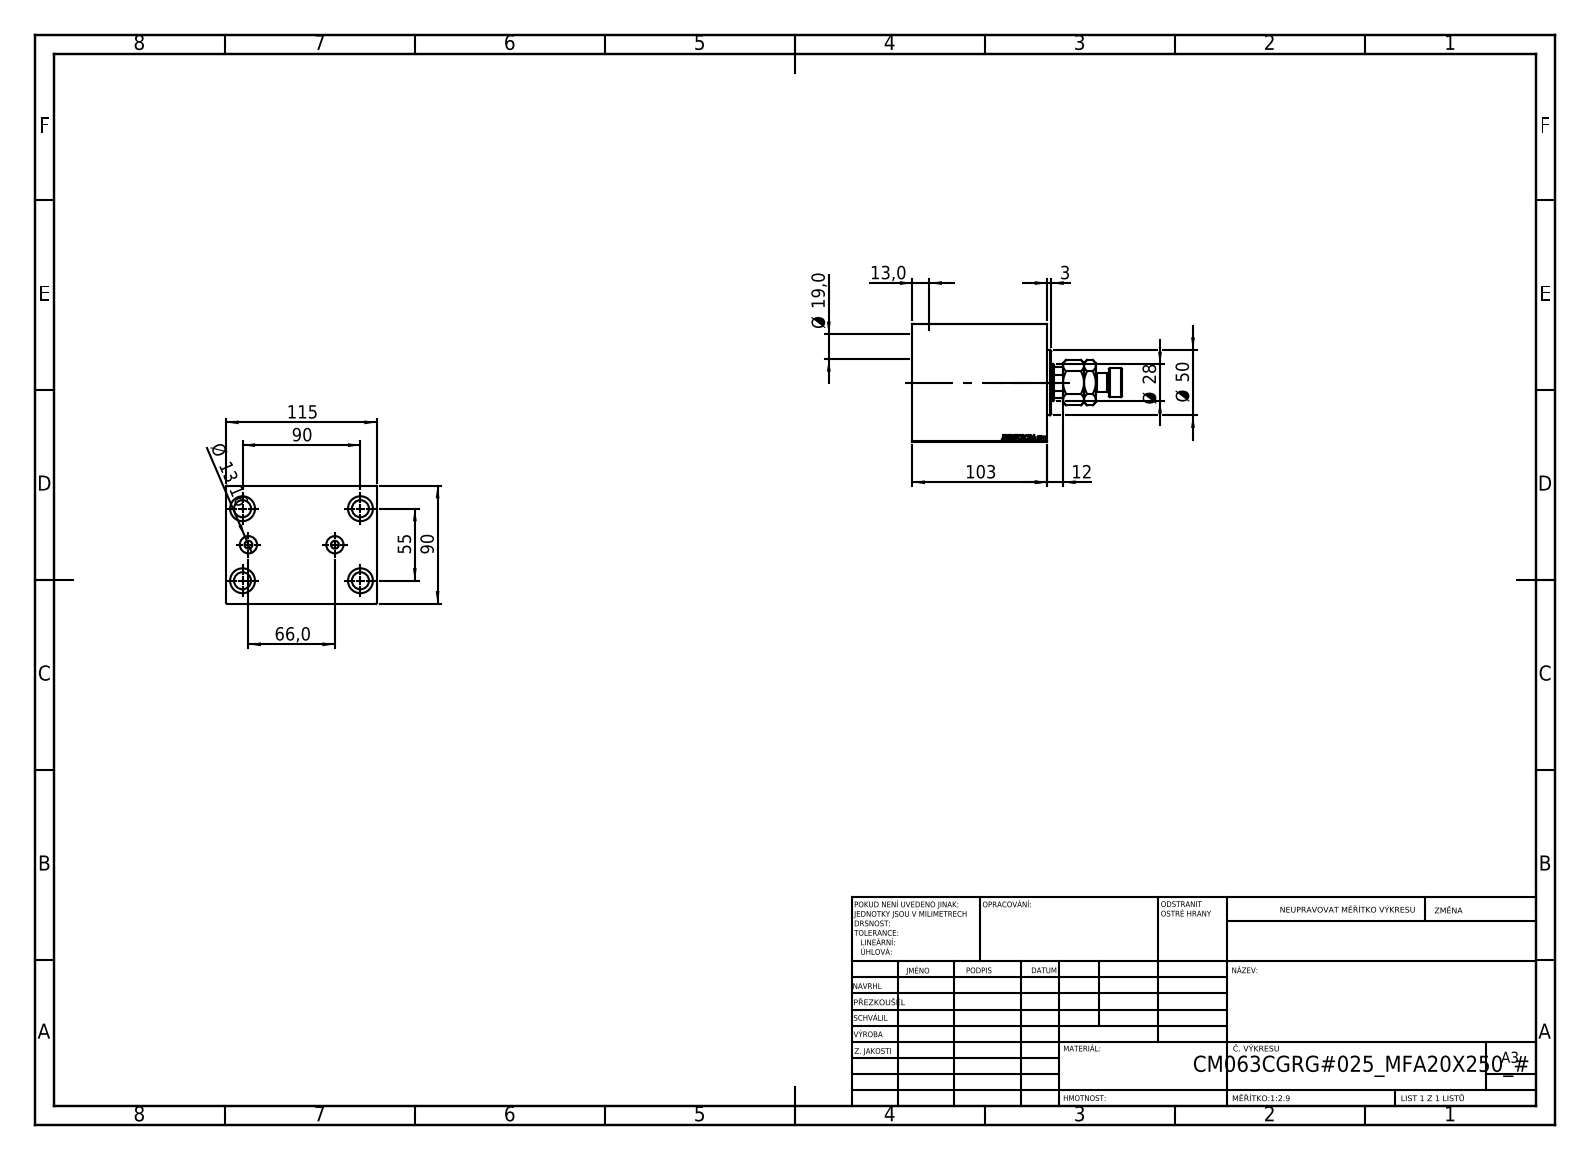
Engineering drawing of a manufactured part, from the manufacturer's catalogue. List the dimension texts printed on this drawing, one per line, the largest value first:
115
103
90
90
66,0
55
Ø 50
Ø 28
Ø 19,0
Ø 13,16
13,0
12
3
